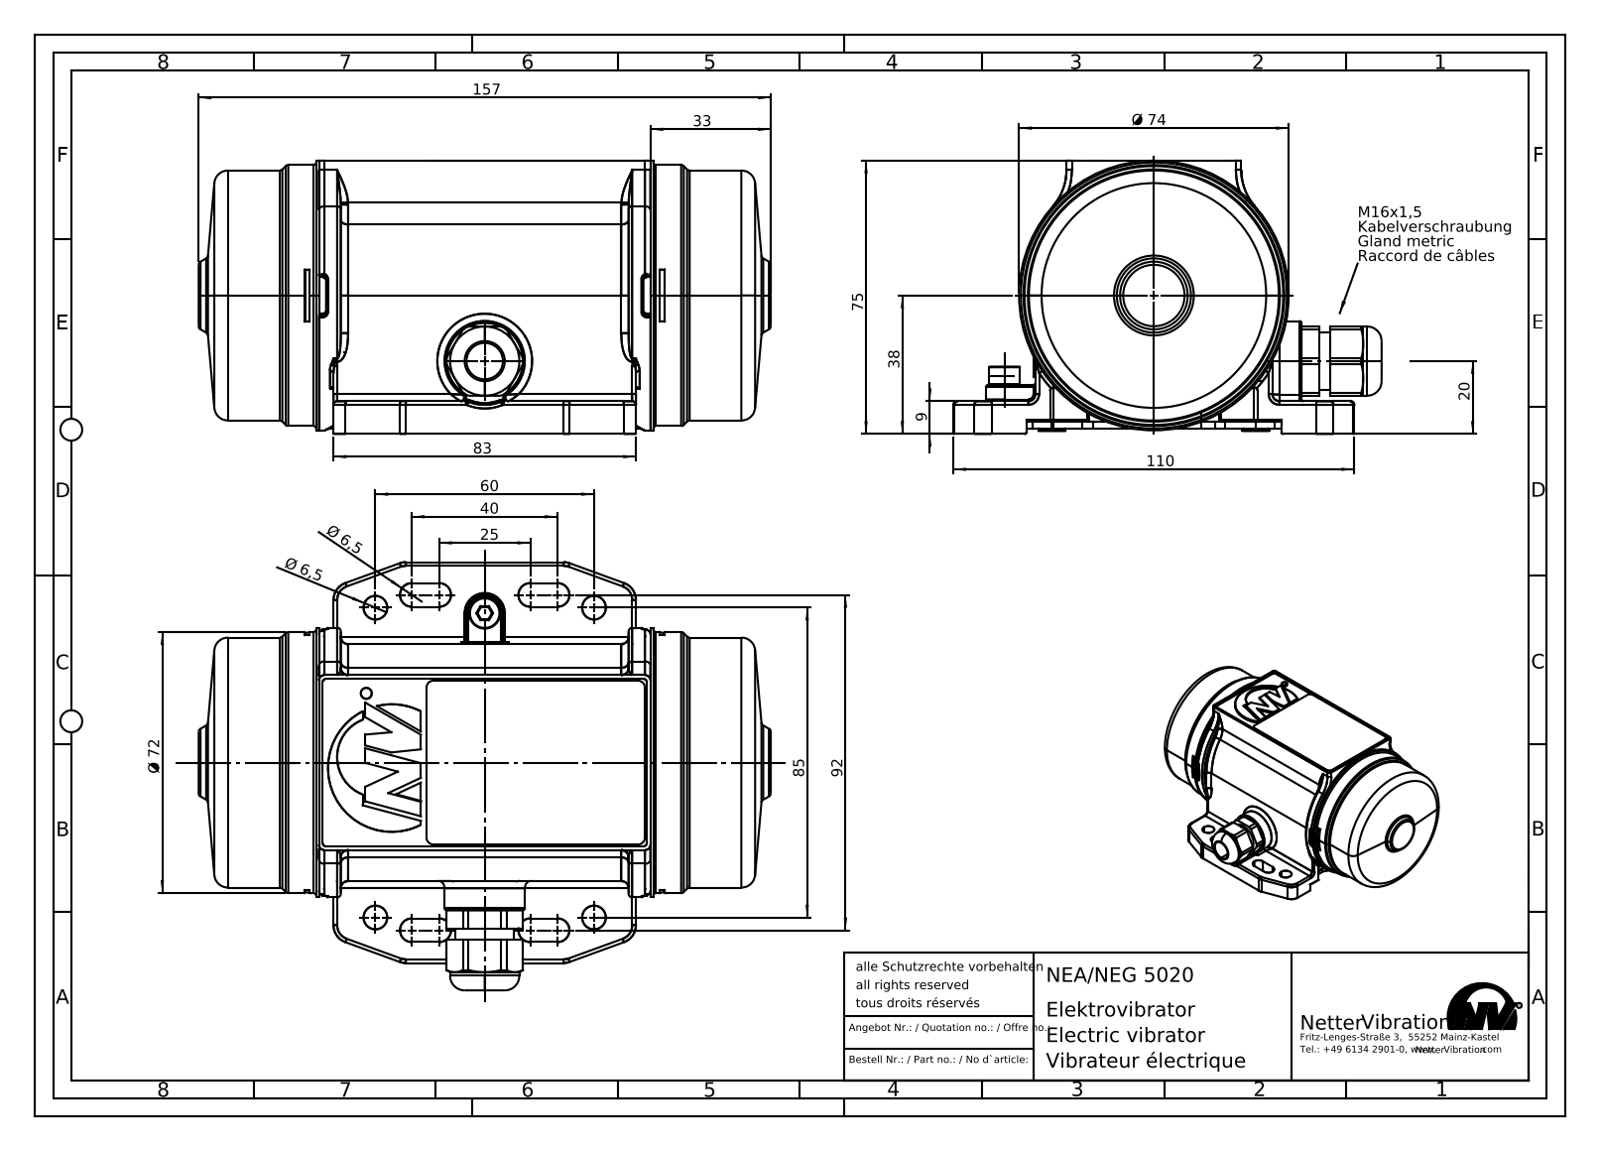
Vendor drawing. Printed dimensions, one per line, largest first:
157
110
92
85
83
75
Ø 74
Ø 72
60
40
38
33
25
20
9
Ø 6,5
Ø 6,5
